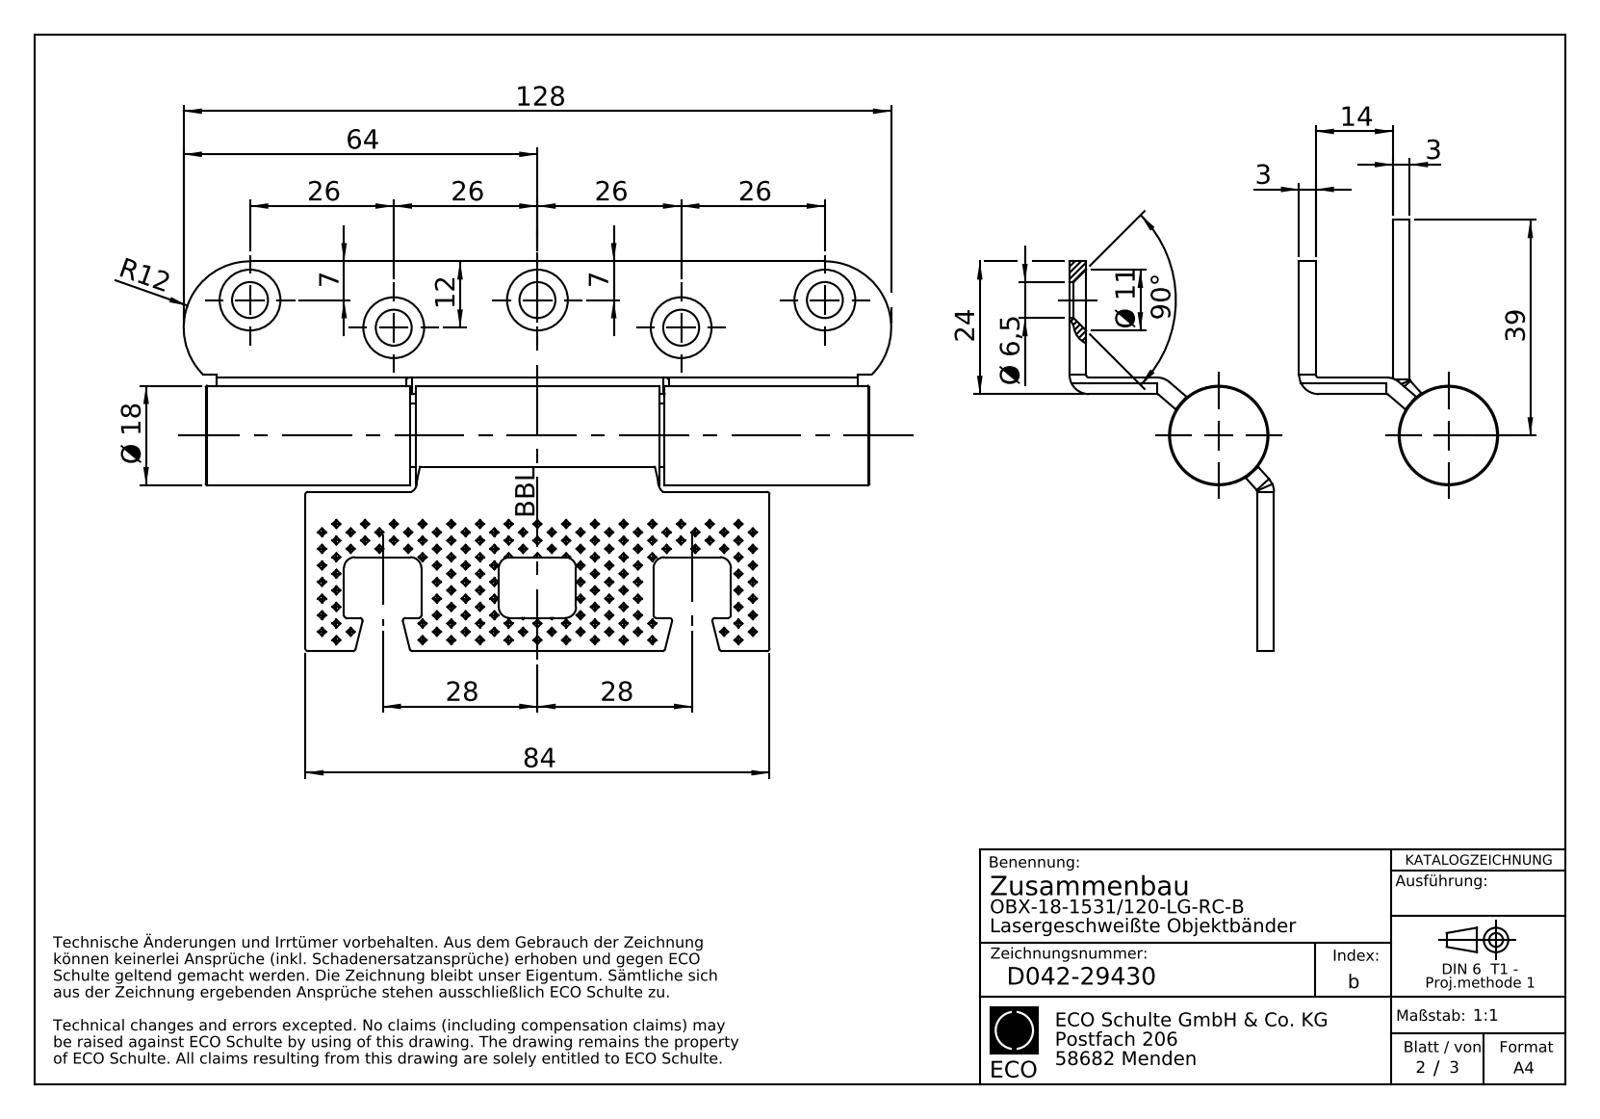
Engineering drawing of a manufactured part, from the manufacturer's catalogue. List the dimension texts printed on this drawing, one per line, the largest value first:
128
90°
84
64
39
28
28
26
26
26
26
24
Ø 18
14
R12
12
Ø 11
7
7
Ø 6,5
3
3
